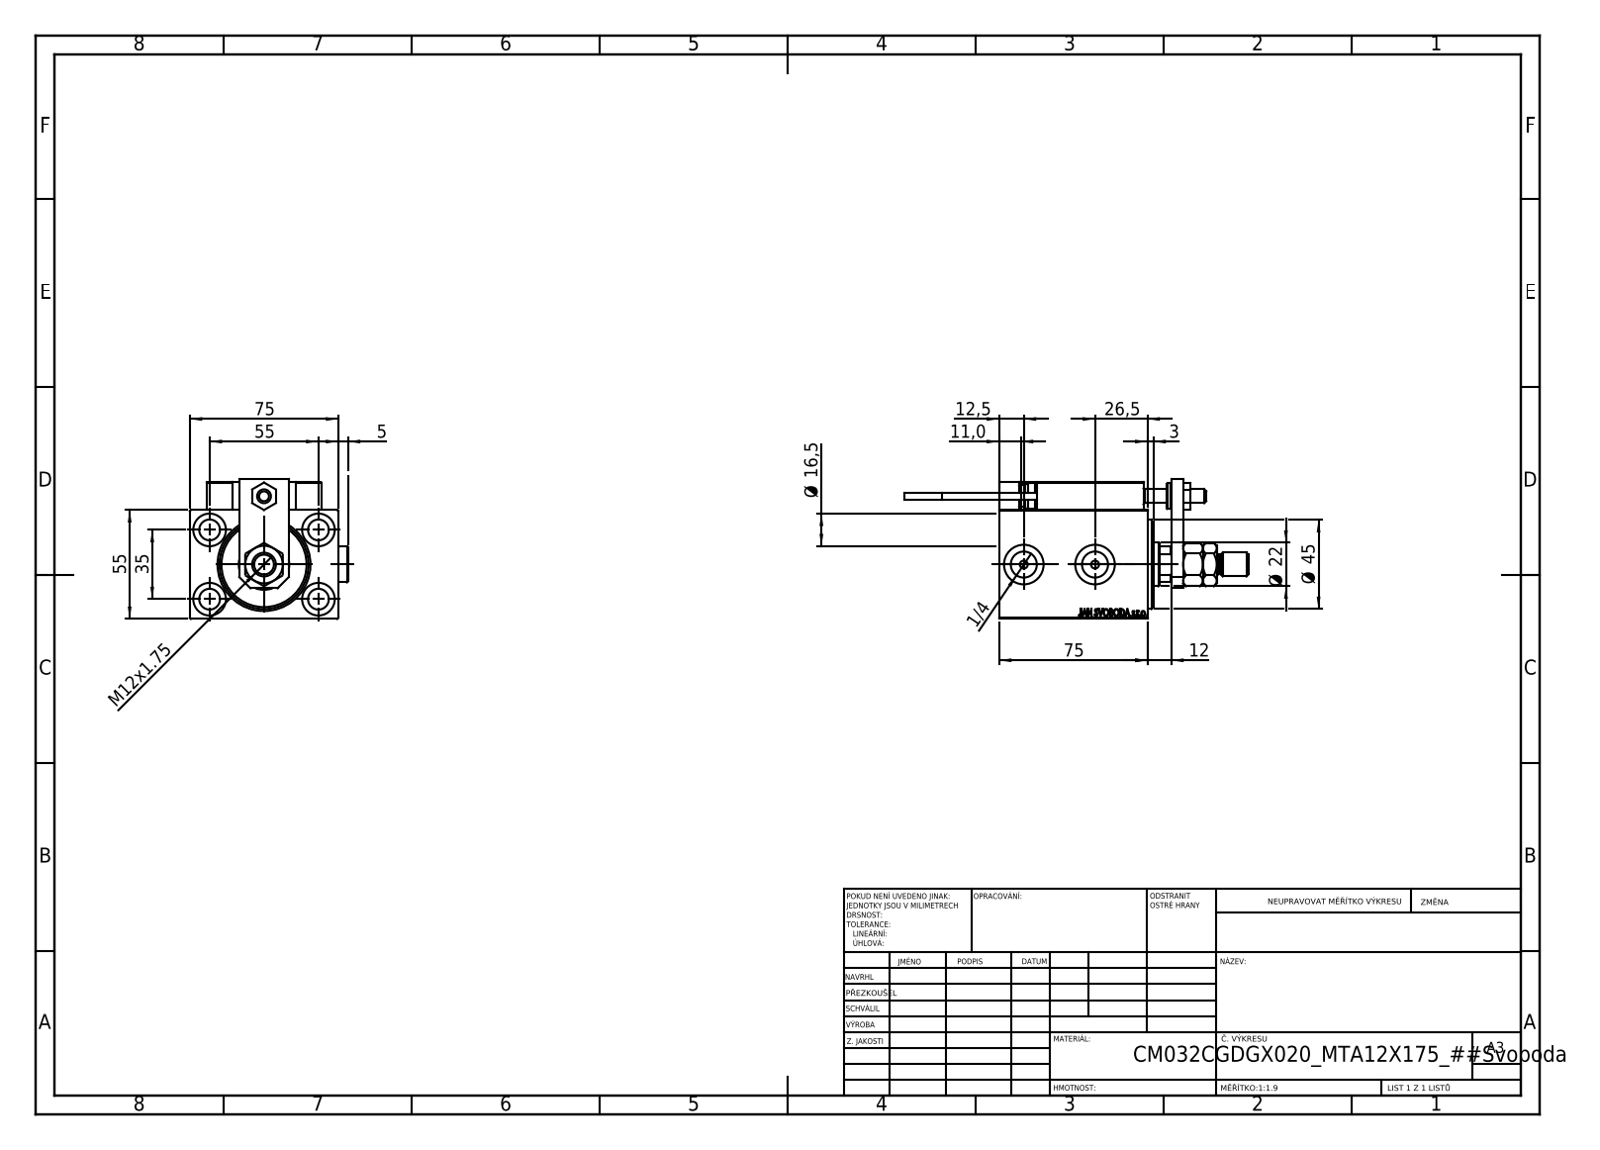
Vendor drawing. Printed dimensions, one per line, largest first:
75
75
55
55
Ø 45
35
26,5
Ø 22
Ø 16,5
12,5
M12x1.75
12
11,0
5
3
1/4
